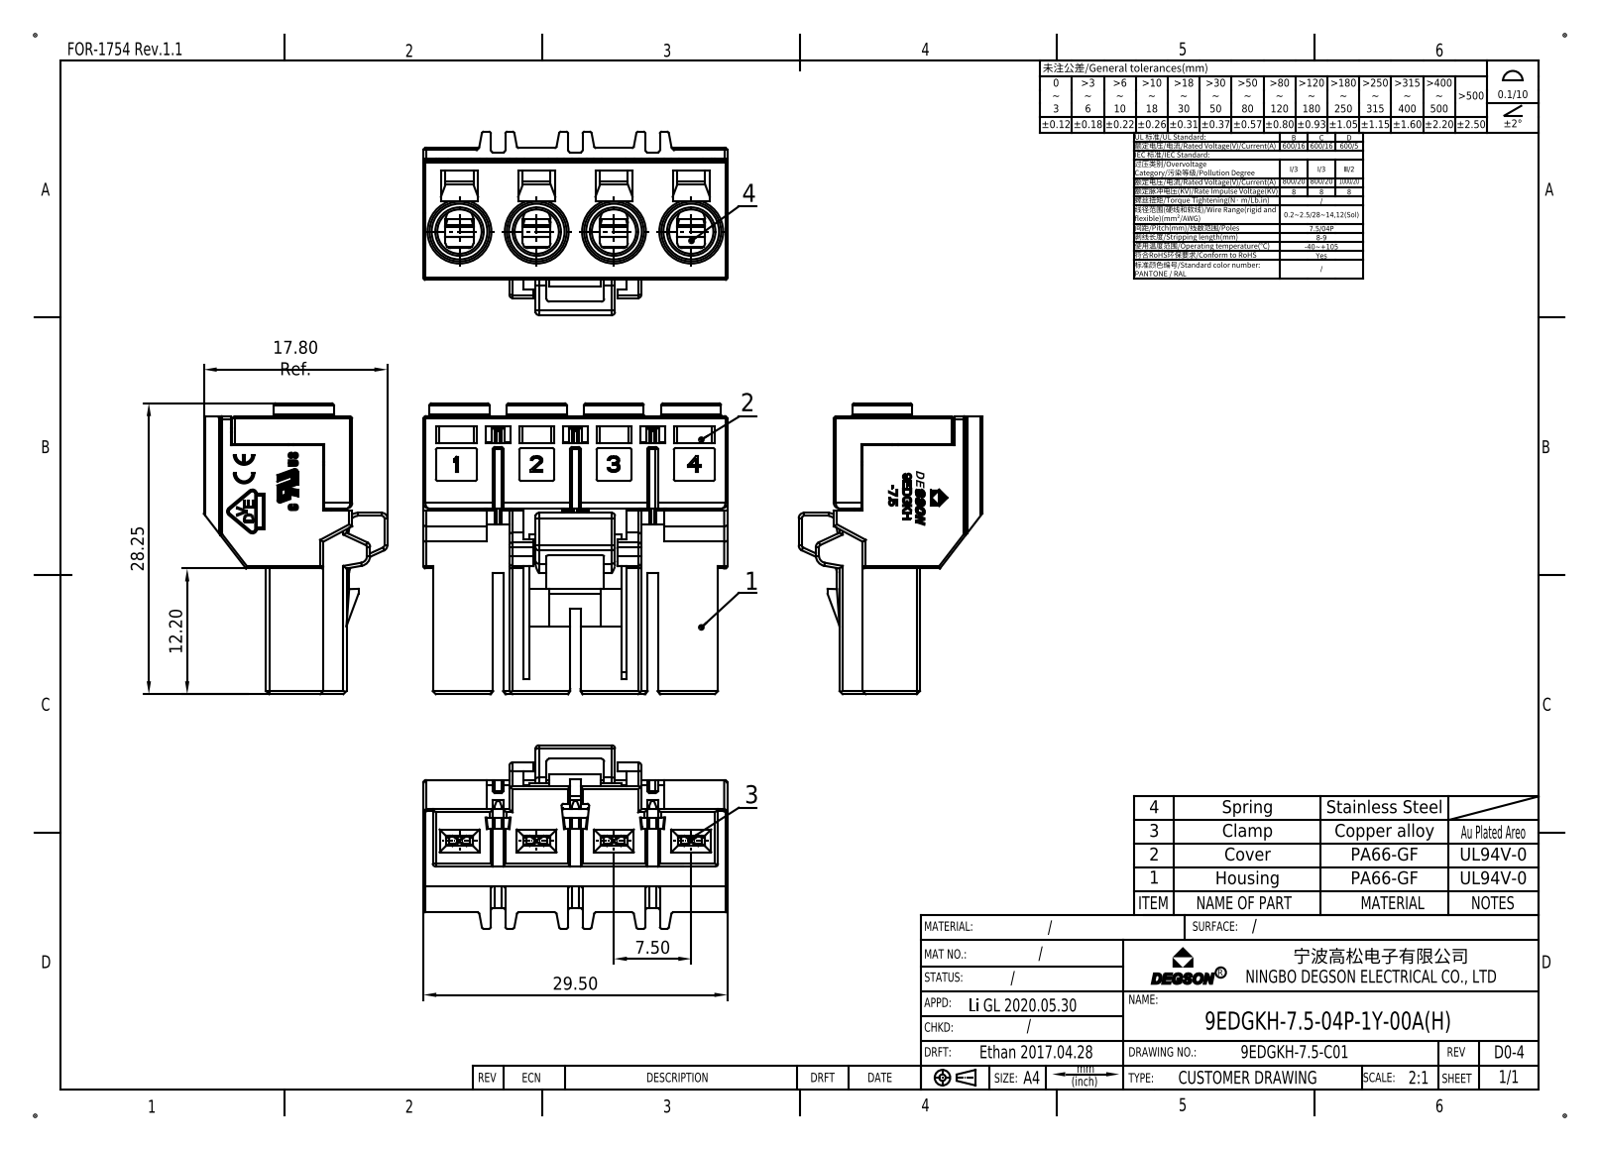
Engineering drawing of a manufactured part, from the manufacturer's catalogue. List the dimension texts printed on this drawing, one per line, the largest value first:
29.50
28.25
17.80 Ref.
12.20
7.50
